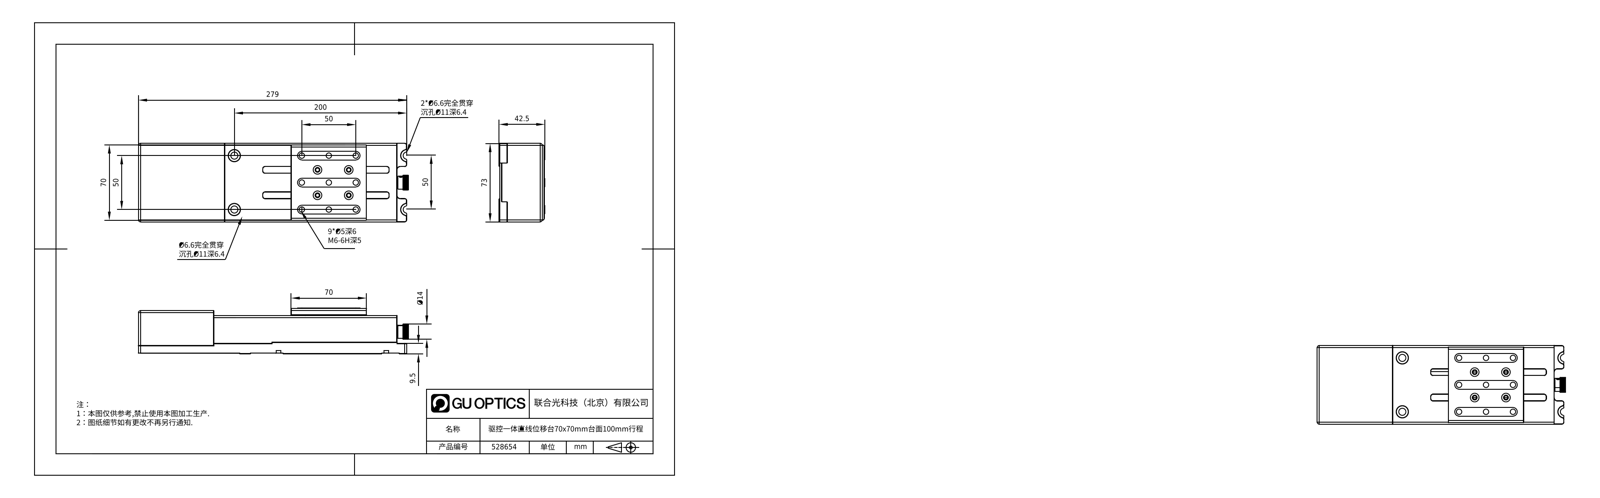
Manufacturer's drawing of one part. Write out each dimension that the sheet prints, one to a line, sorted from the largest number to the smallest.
279
200
73
70
70
50
50
50
42.5
Ø14
9.5
